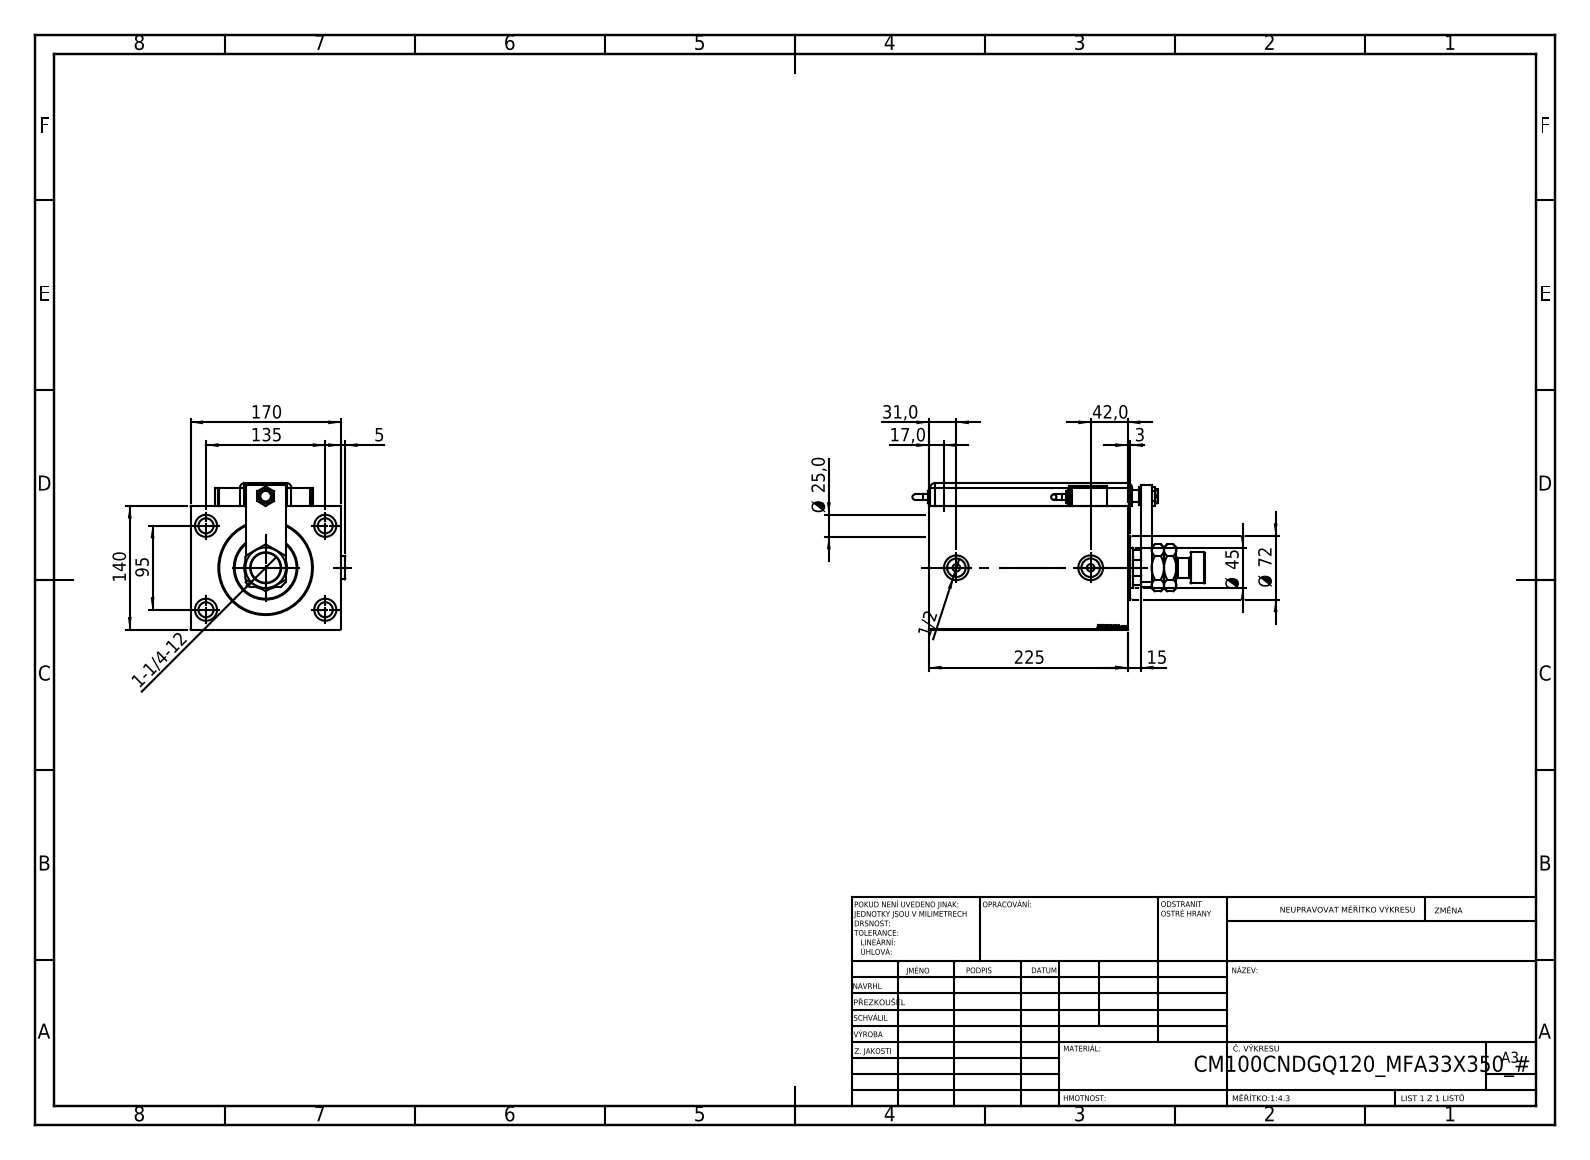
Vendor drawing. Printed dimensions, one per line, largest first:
225
170
140
135
95
Ø 72
Ø 45
42,0
31,0
Ø 25,0
17,0
15
5
3
1-1/4-12
1/2
